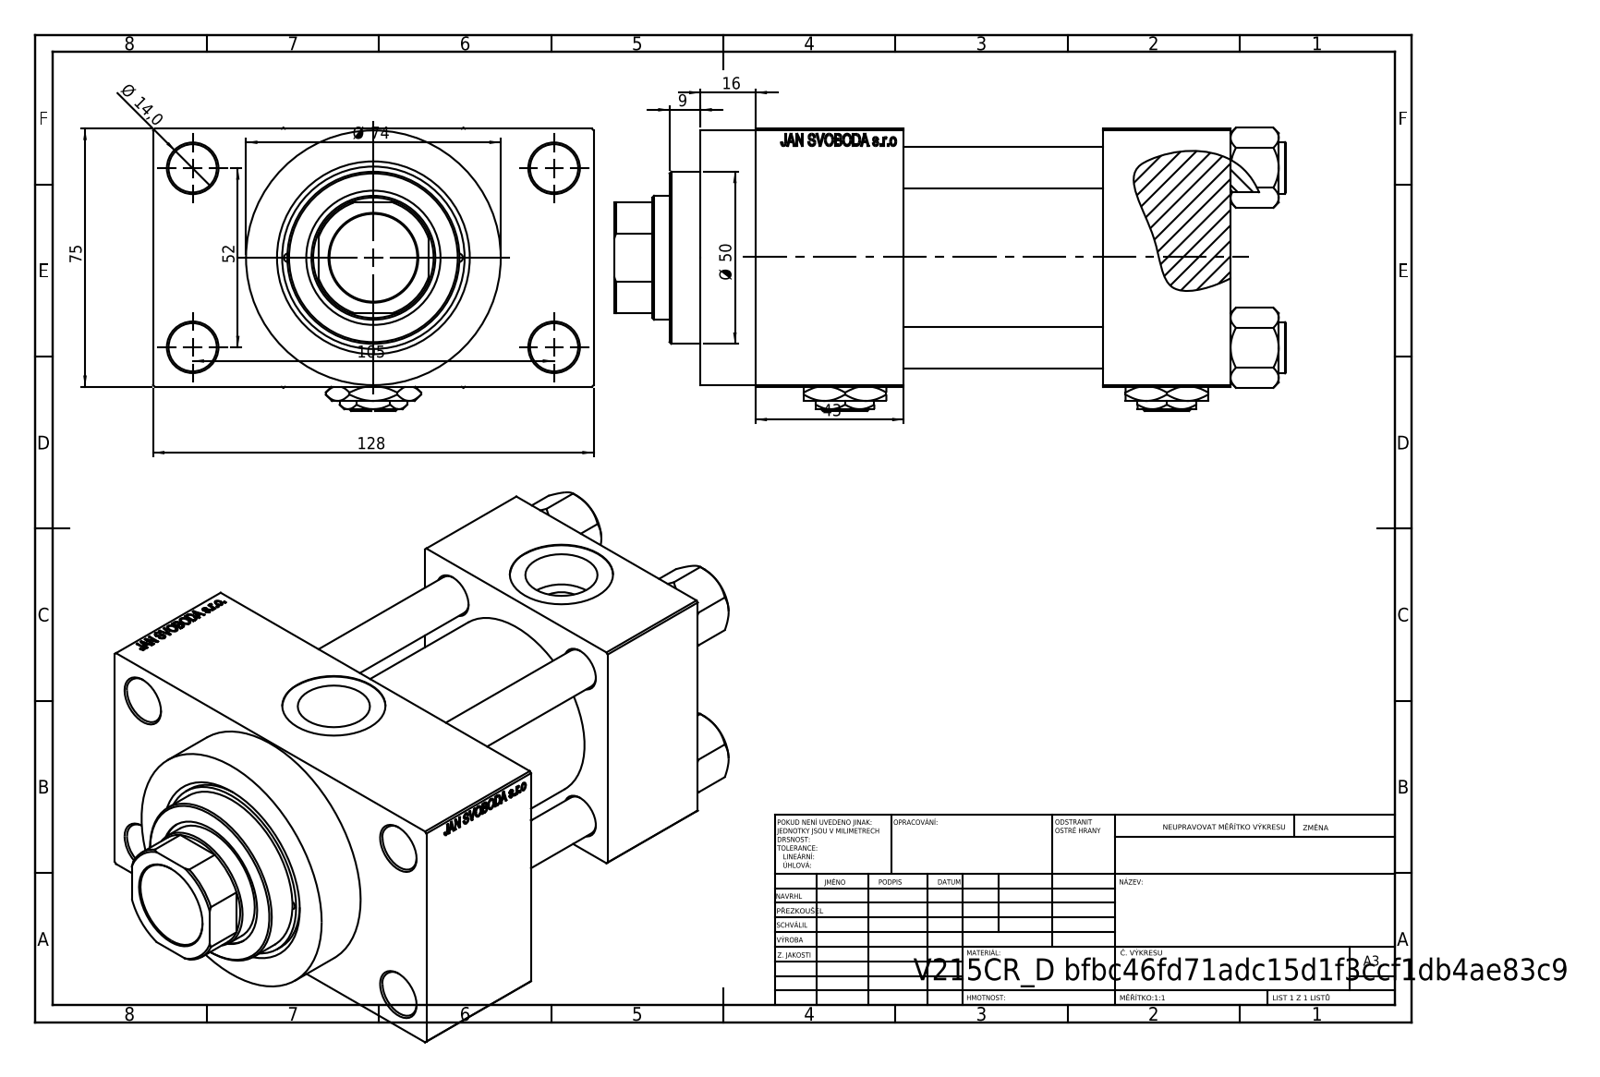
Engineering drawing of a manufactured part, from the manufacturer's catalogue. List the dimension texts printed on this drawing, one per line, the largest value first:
128
105
75
Ø 74
52
Ø 50
43
16
Ø 14,0
9
